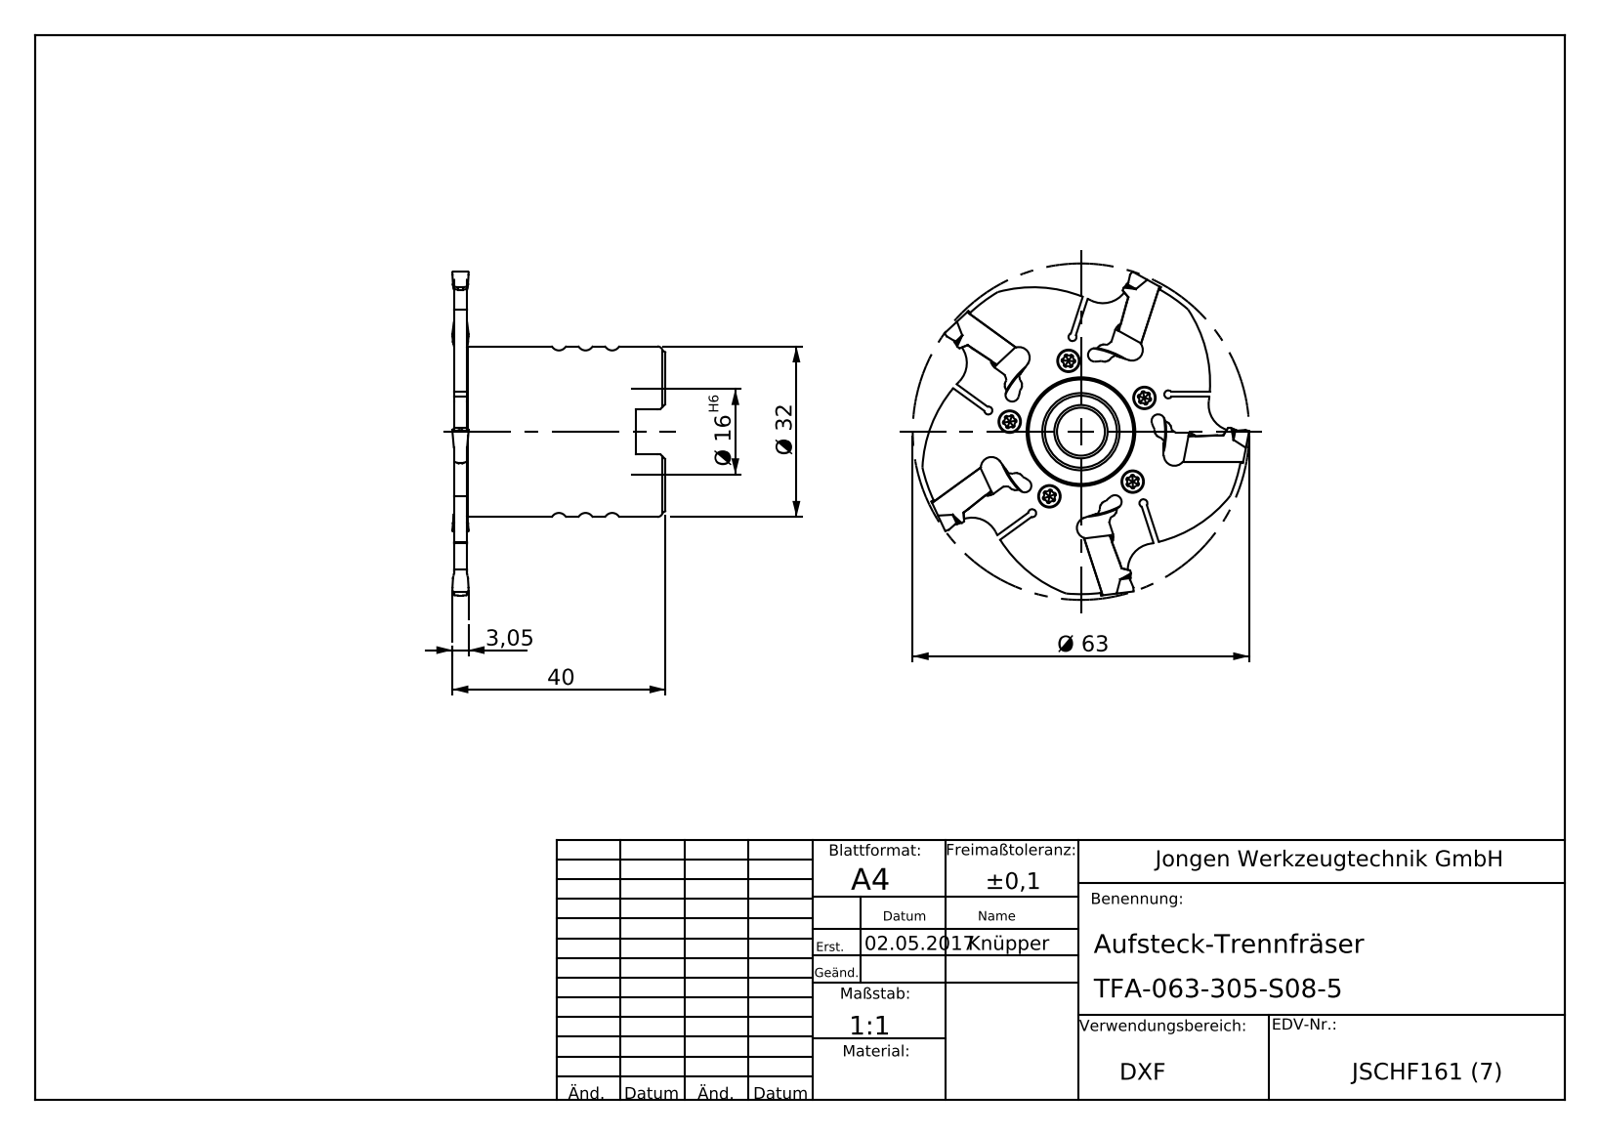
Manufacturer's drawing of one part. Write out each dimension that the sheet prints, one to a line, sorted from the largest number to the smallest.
Ø 63
40
Ø 32
Ø 16 H6
3,05
